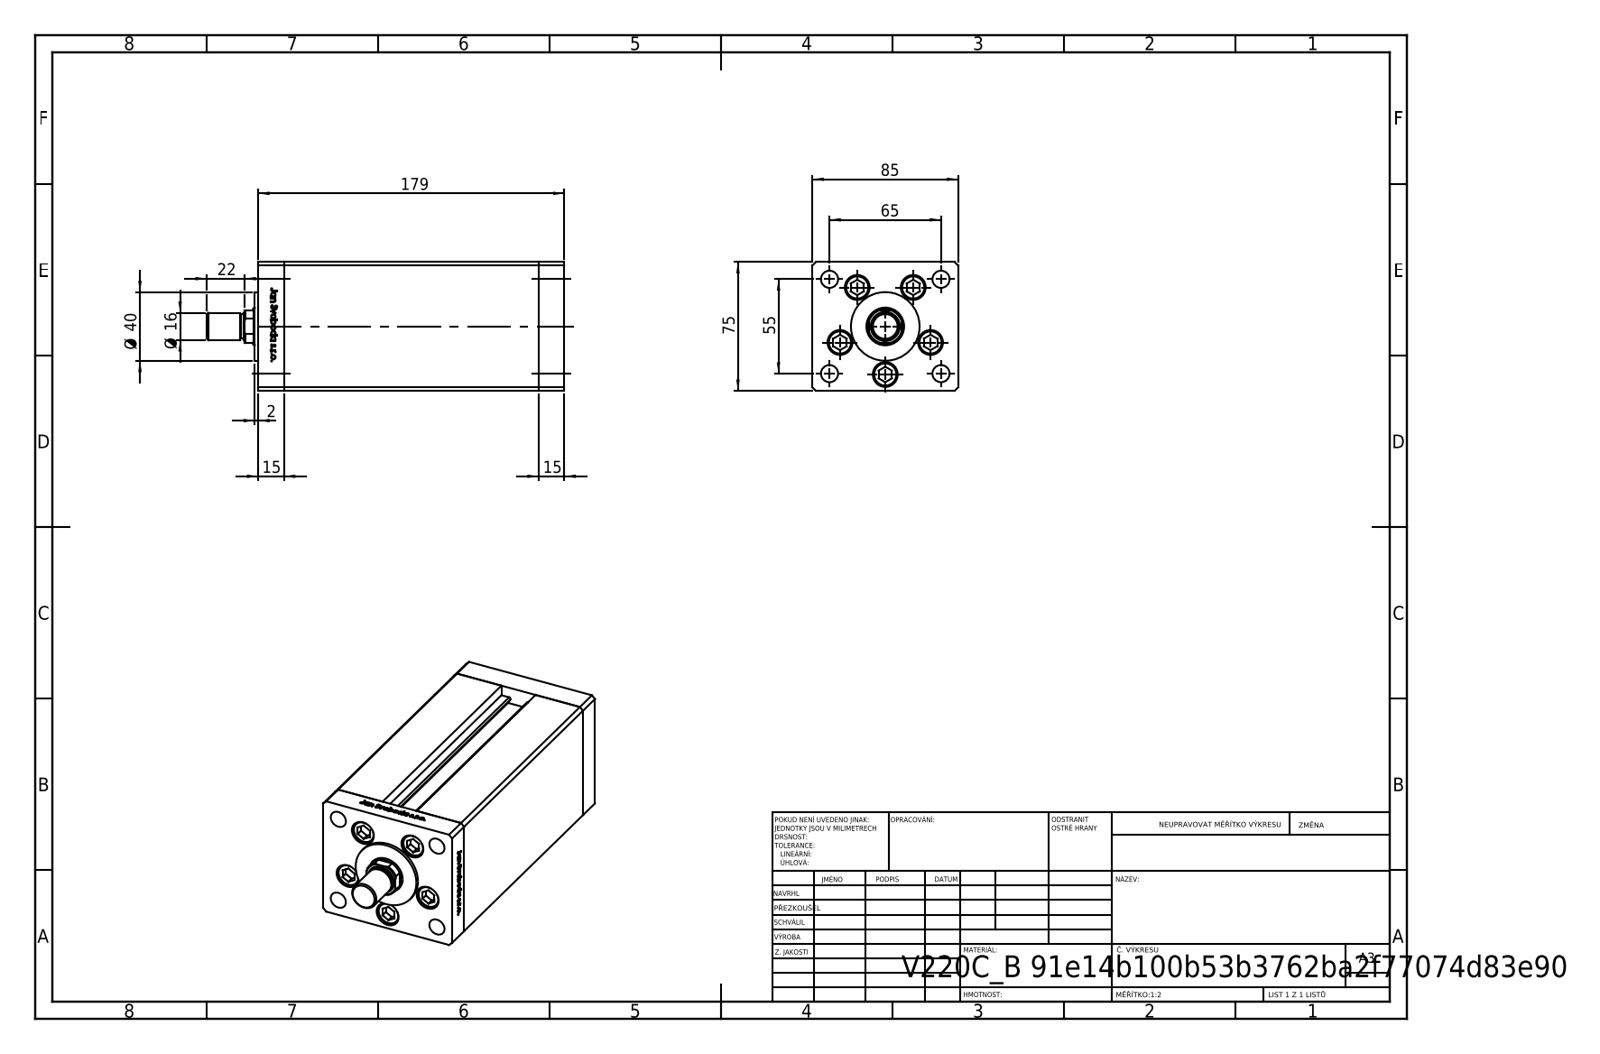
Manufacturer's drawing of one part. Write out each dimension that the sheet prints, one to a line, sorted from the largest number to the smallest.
179
85
75
65
55
Ø 40
22
Ø 16
15
15
2
